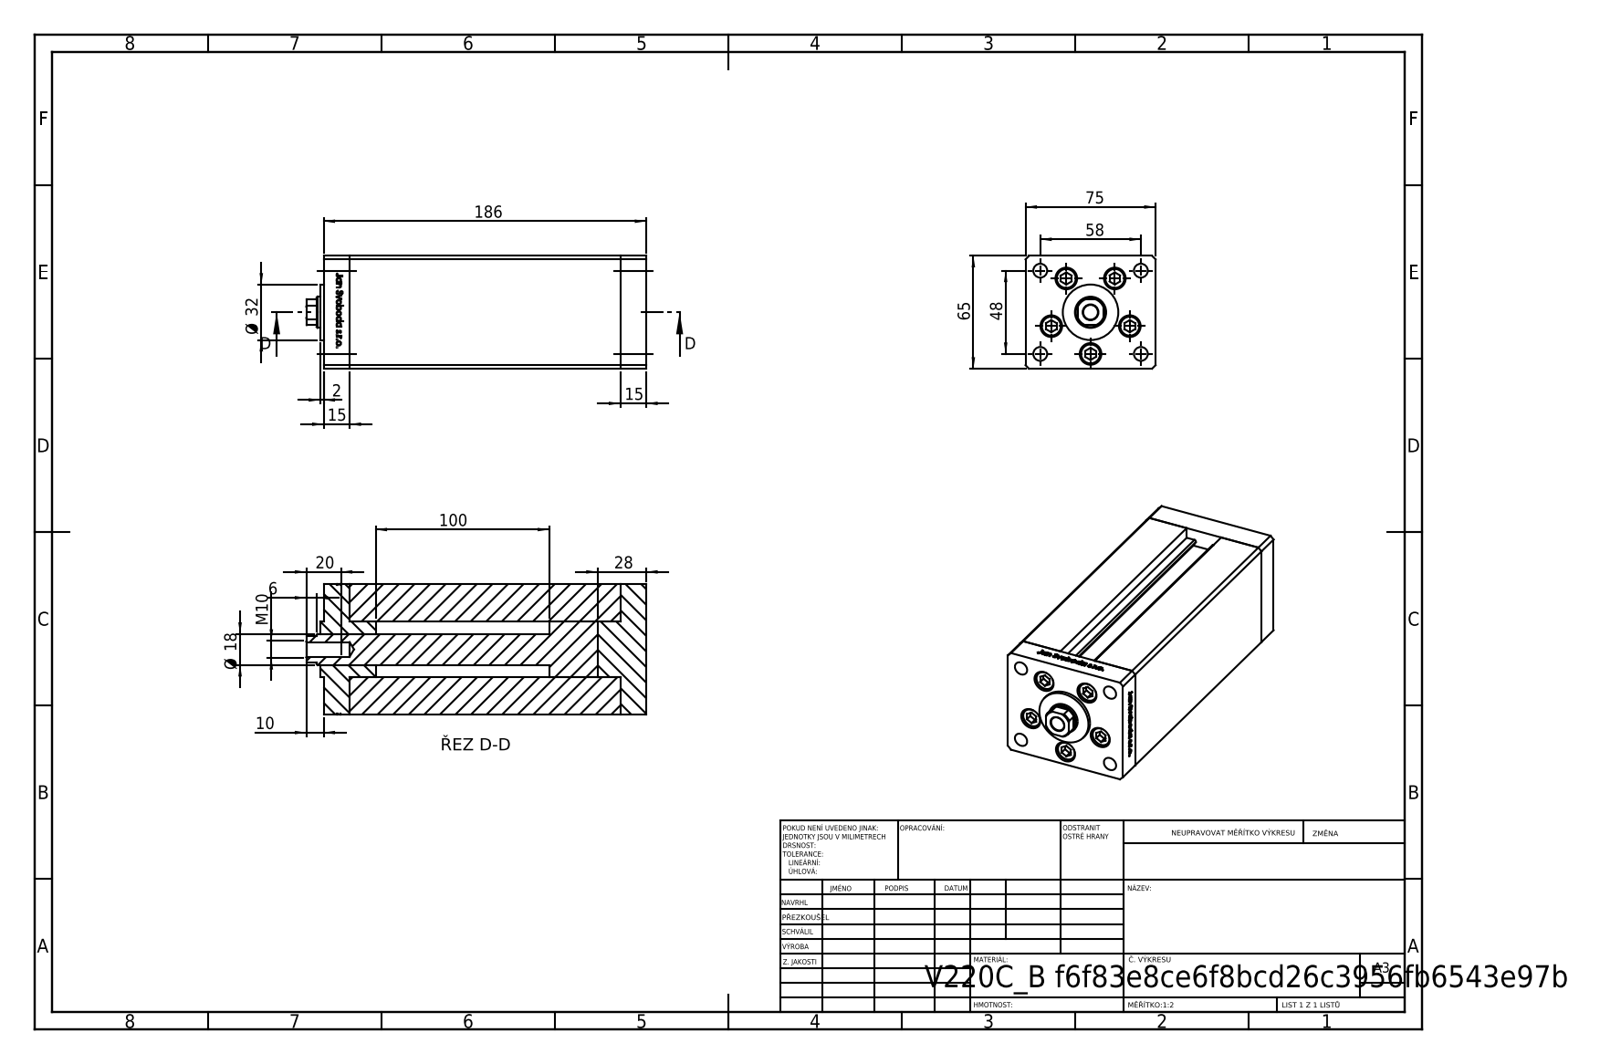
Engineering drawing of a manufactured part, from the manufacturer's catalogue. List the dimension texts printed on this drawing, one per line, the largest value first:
186
100
75
65
58
48
Ø 32
28
20
Ø 18
15
15
M10
10
6
2
